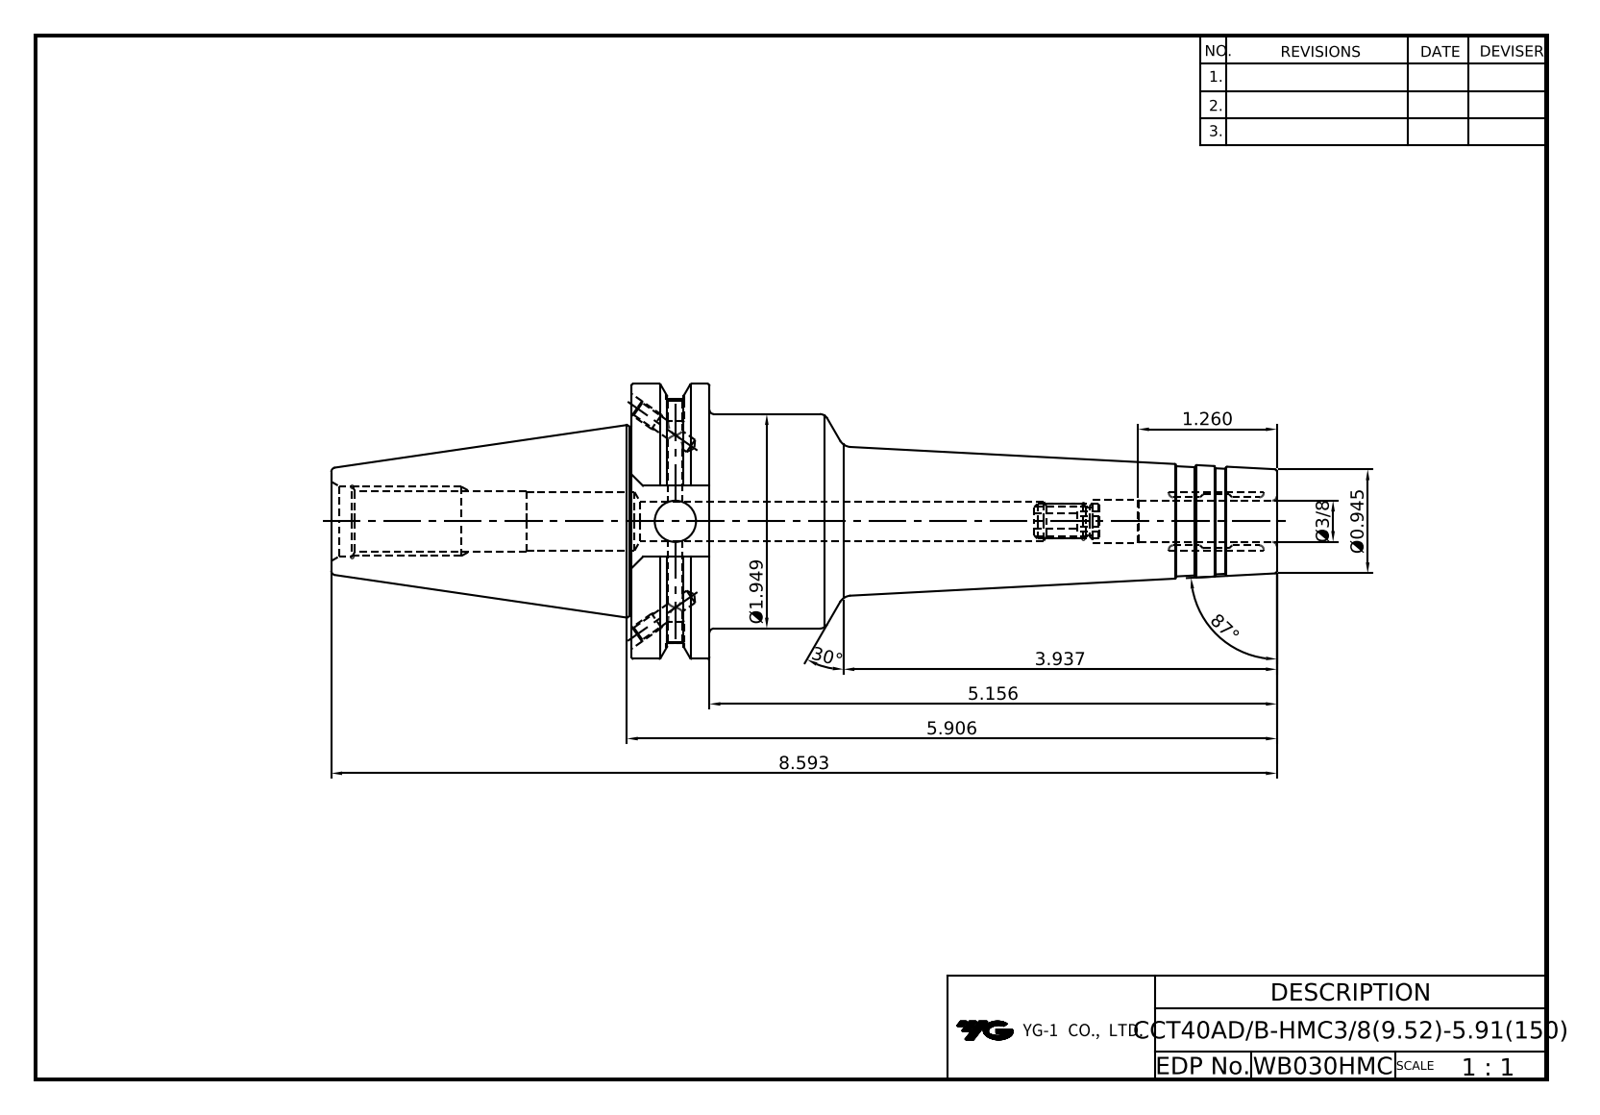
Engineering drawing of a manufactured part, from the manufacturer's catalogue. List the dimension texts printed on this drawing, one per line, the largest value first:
87°
30°
8.593
5.906
5.156
3.937
Ø1.949
1.260
Ø0.945
Ø3/8
